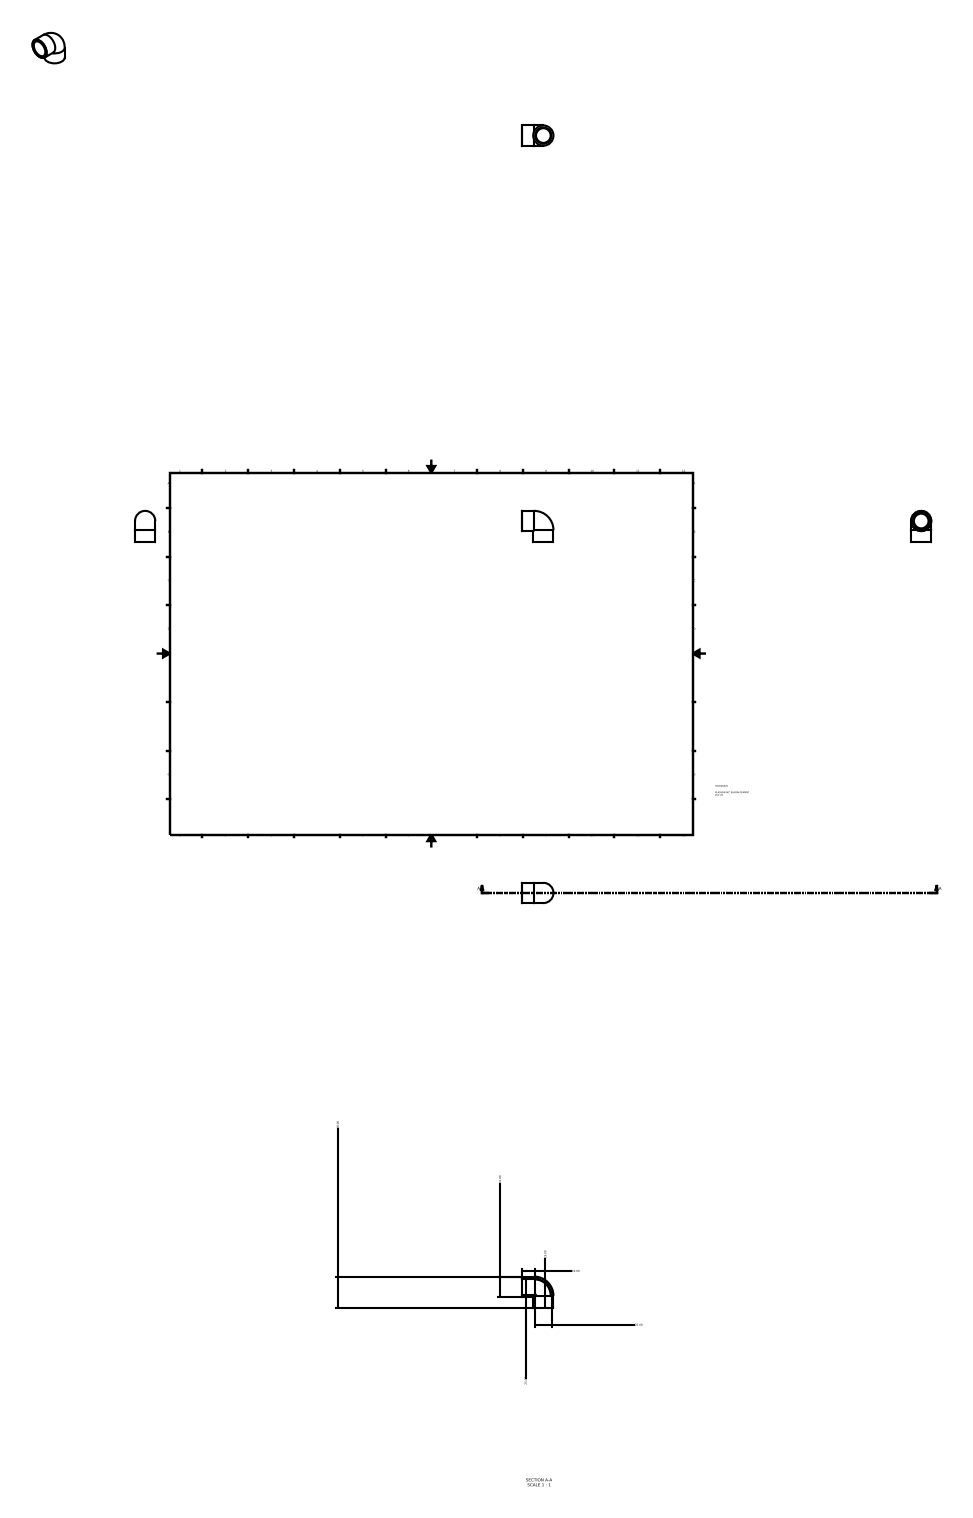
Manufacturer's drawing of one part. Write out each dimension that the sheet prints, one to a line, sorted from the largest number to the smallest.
48.00
31.00
25.00
25.00
19.00
19.00
